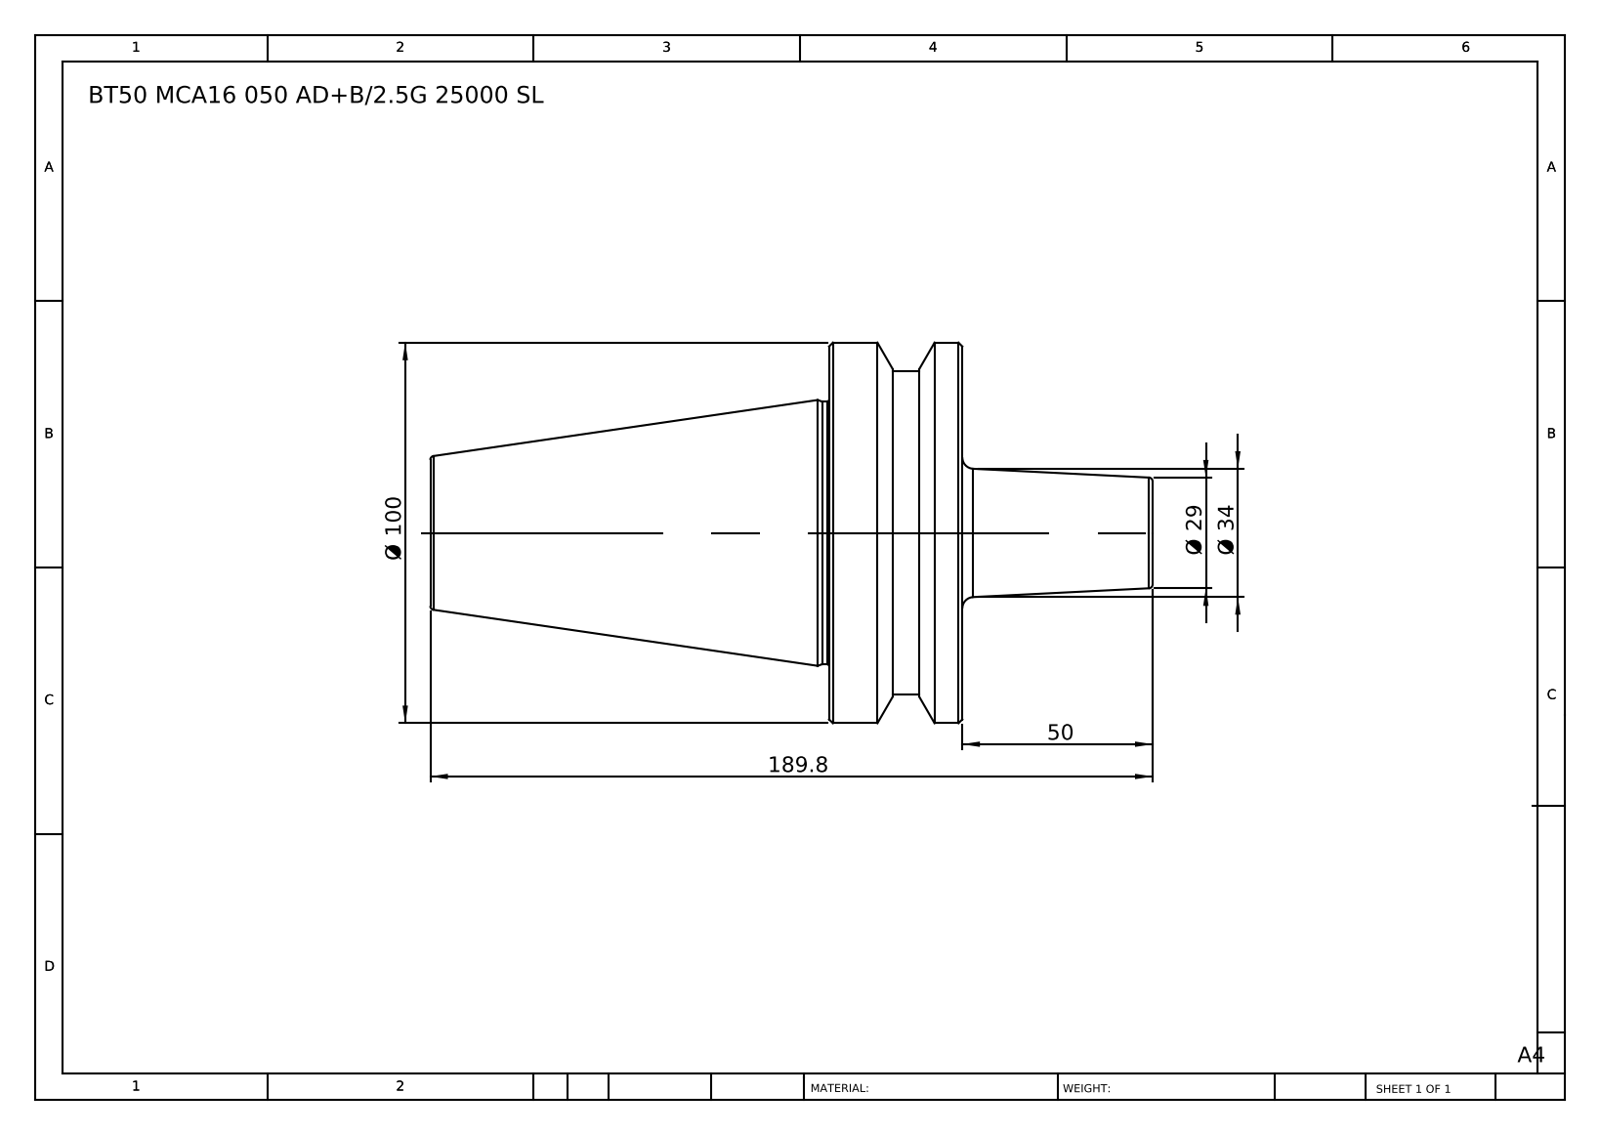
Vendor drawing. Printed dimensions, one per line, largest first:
189.8
Ø 100
50
Ø 34
Ø 29
